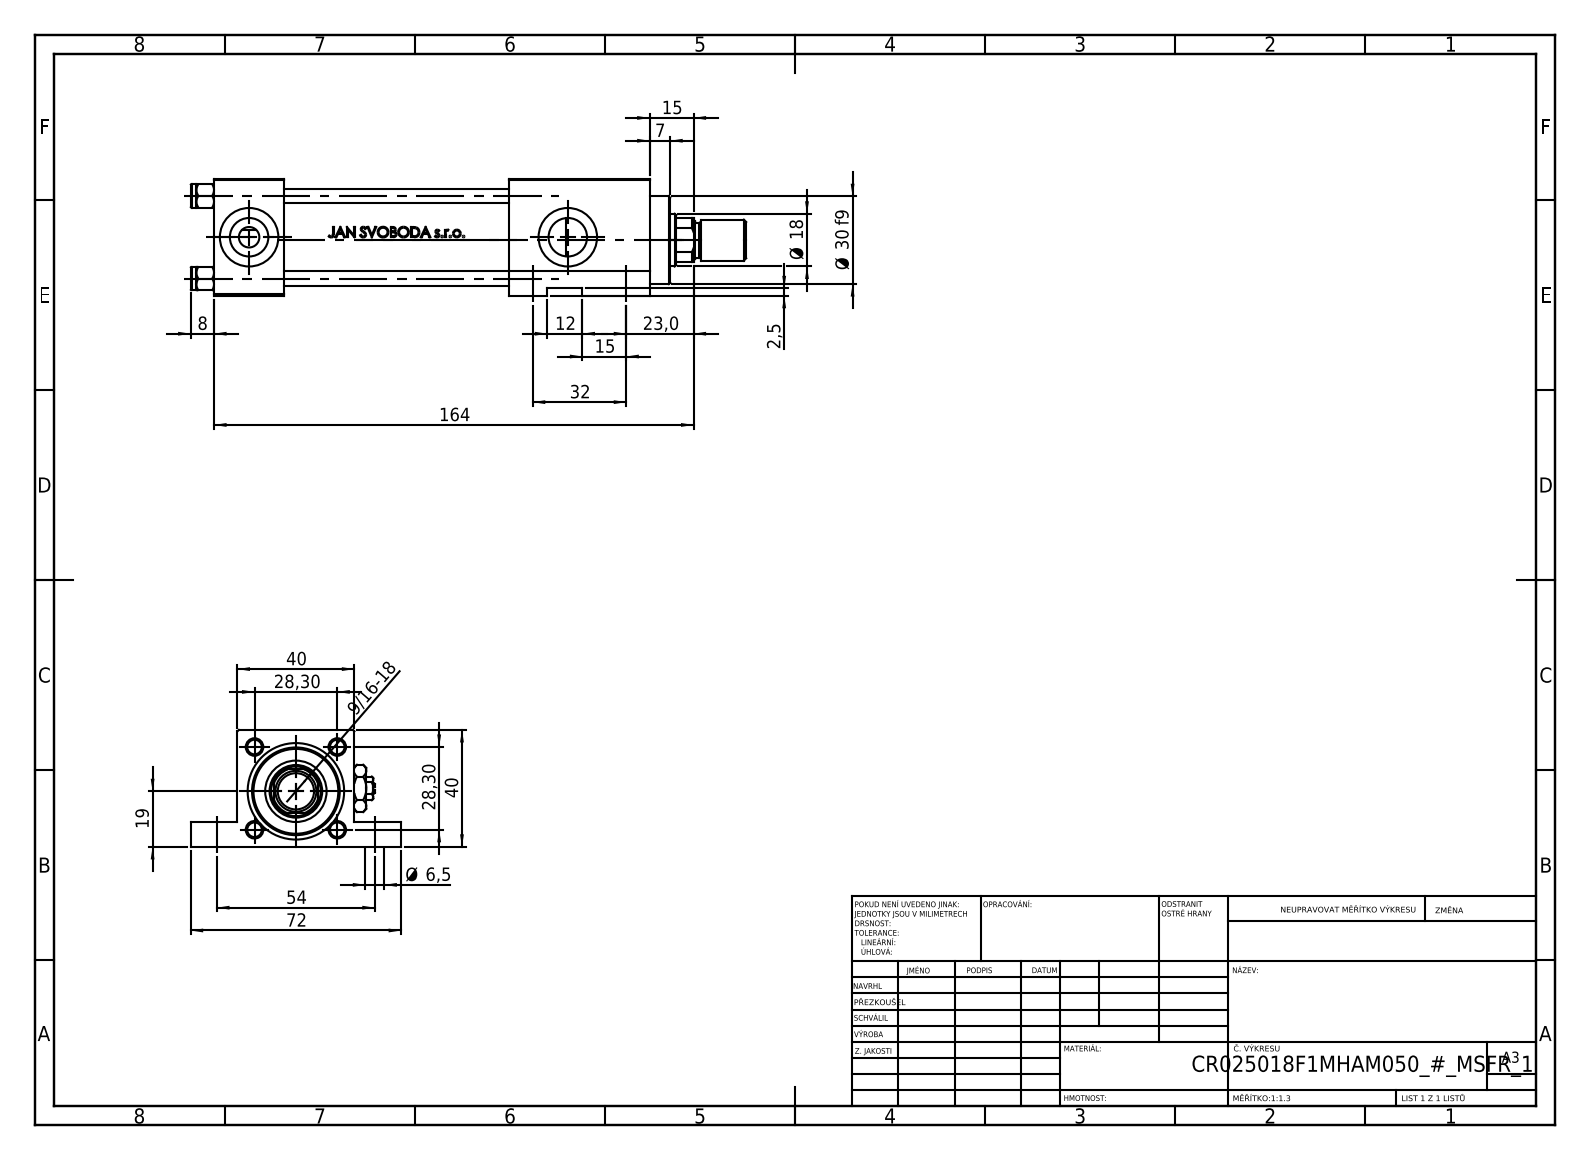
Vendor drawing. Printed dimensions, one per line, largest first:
164
72
54
40
40
32
Ø 30 f9
28,30
28,30
23,0
19
Ø 18
15
15
12
8
7
Ø 6,5
2,5
9/16-18
